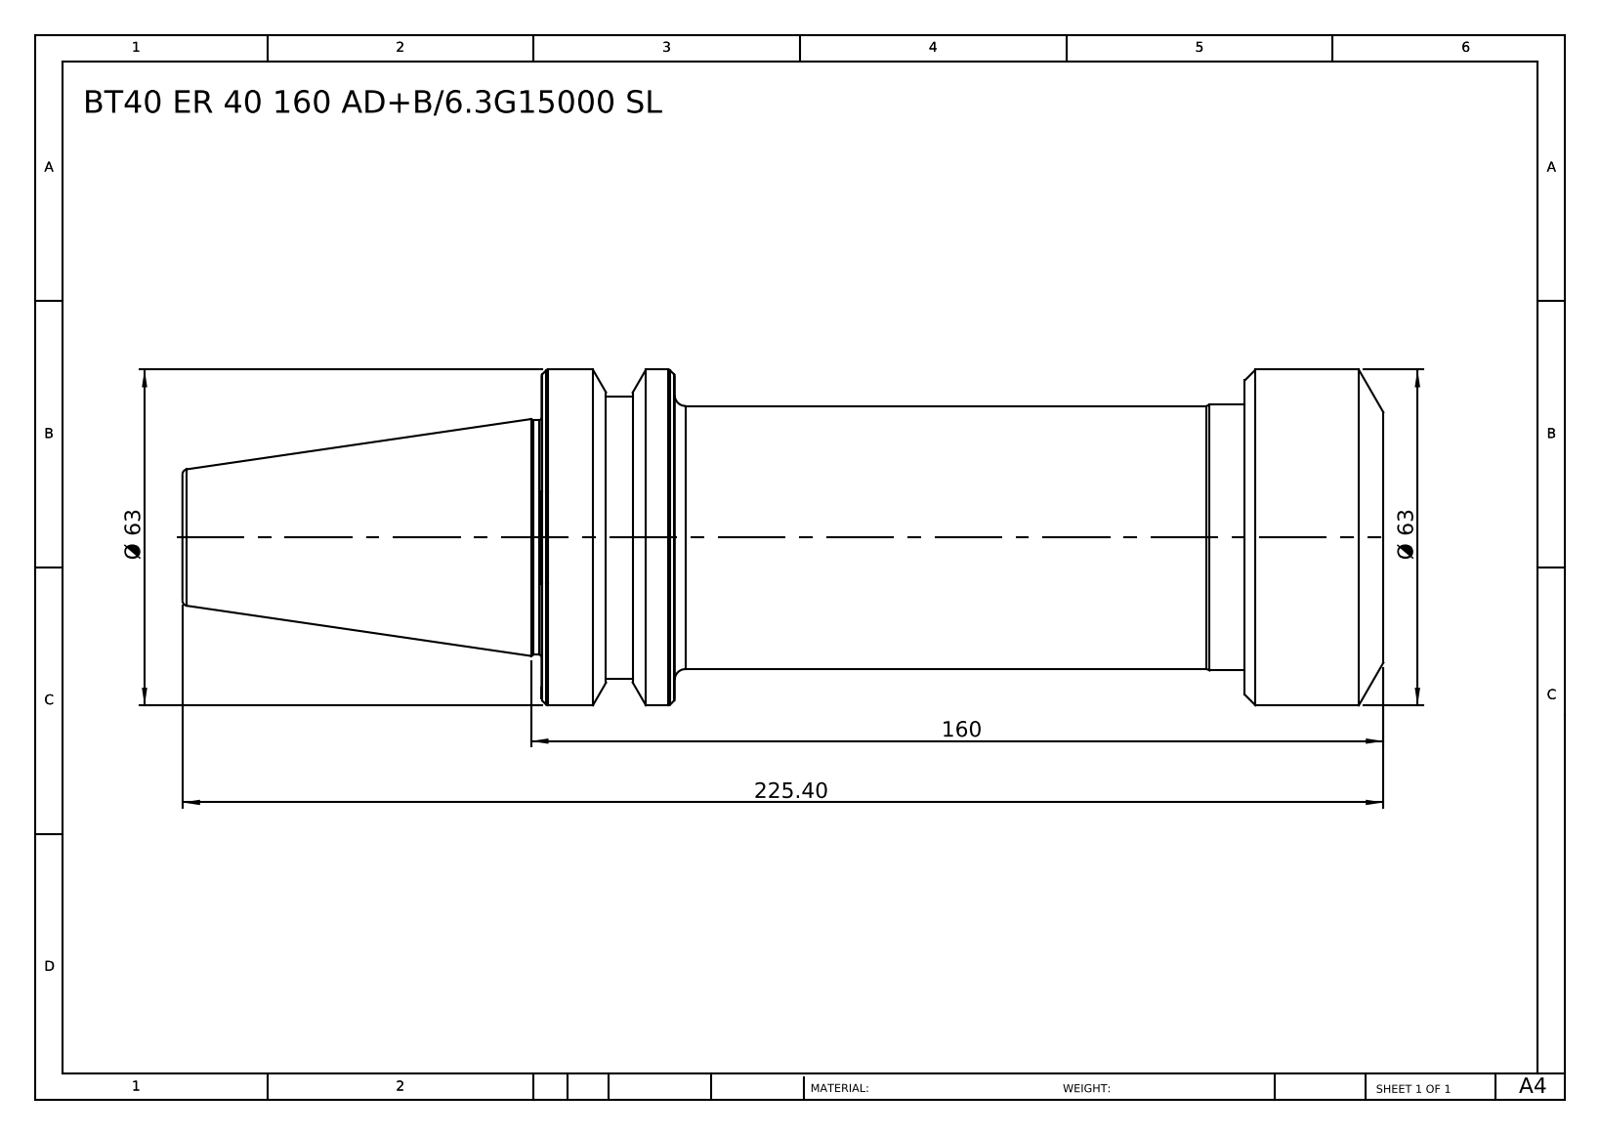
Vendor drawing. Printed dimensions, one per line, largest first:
225.40
160
Ø 63
Ø 63
